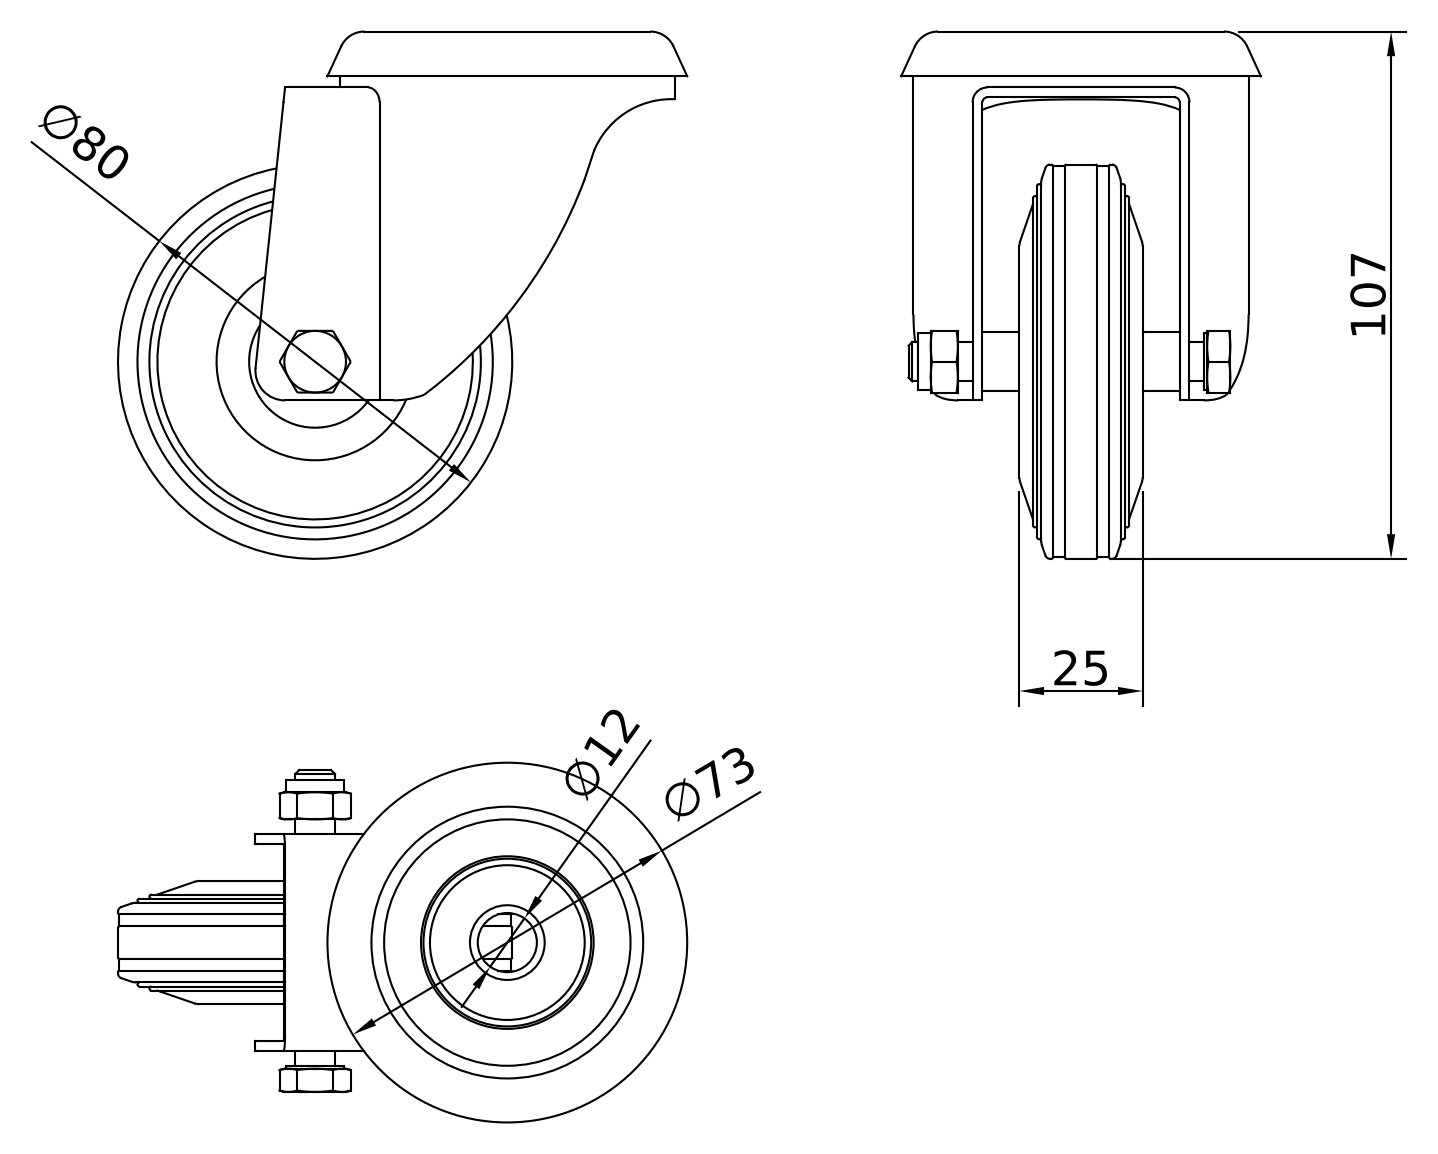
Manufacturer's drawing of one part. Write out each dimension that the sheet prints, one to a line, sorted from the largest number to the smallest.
107
∅80
∅73
25
∅12
